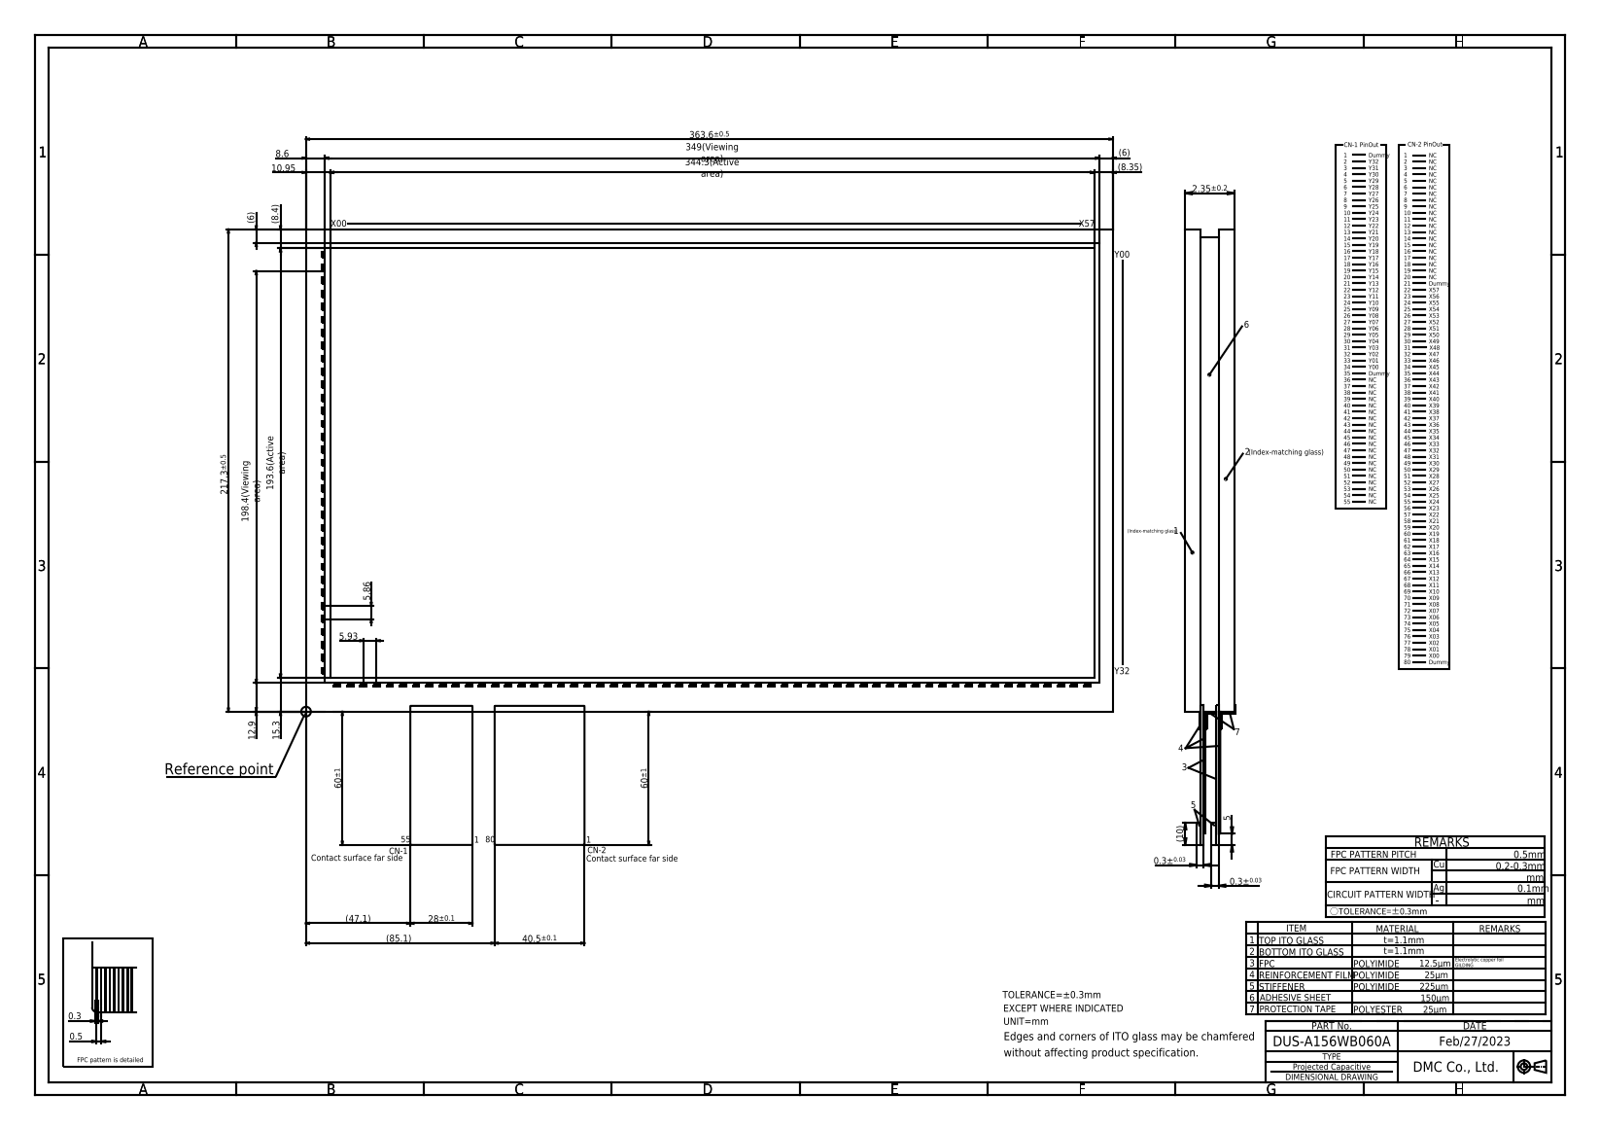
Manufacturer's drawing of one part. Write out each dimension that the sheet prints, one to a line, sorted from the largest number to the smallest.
363.6±0.5
349(Viewing area)
344.3(Active area)
217.3±0.5
198.4(Viewing area)
193.6(Active area)
(85.1)
60±1
60±1
(47.1)
40.5±0.1
28±0.1
15.3
12.9
10.95
(10)
8.6
(8.4)
(8.35)
(6)
(6)
5.93
5.86
5
2.35±0.2
0.5
0.3
0.3±0.03
0.3±0.03
